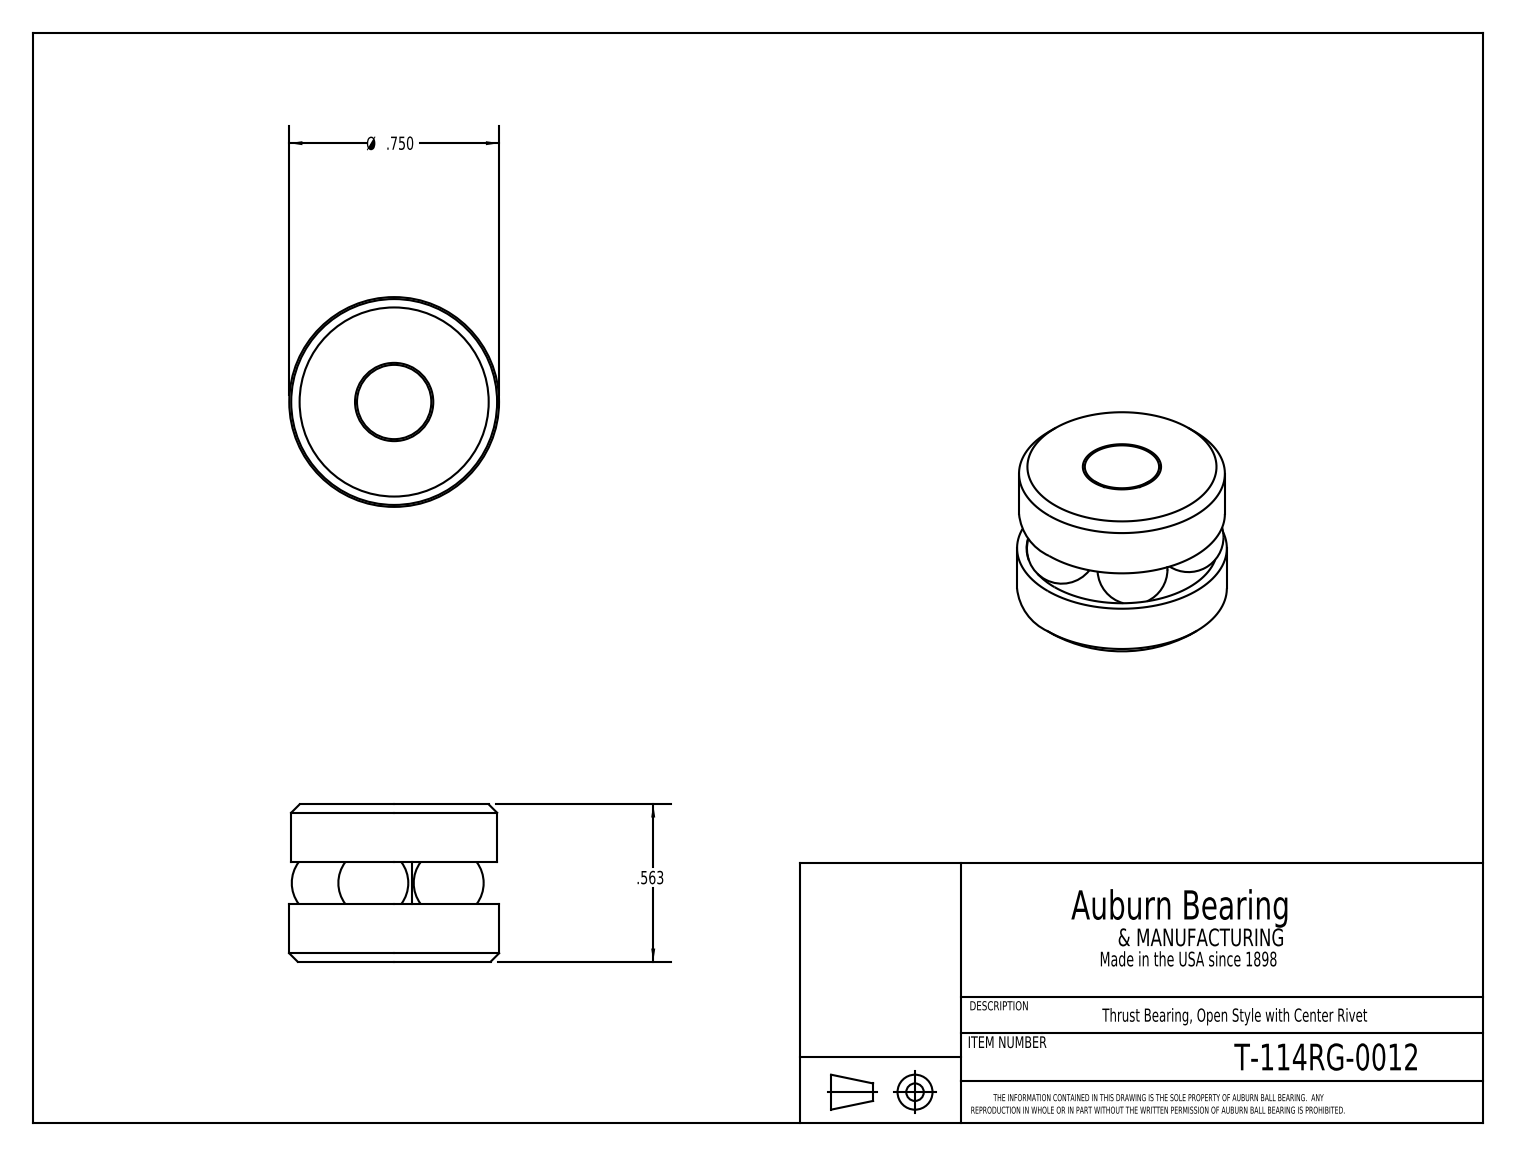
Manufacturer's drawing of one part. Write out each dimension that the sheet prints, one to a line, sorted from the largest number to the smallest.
Ø .750
.563
